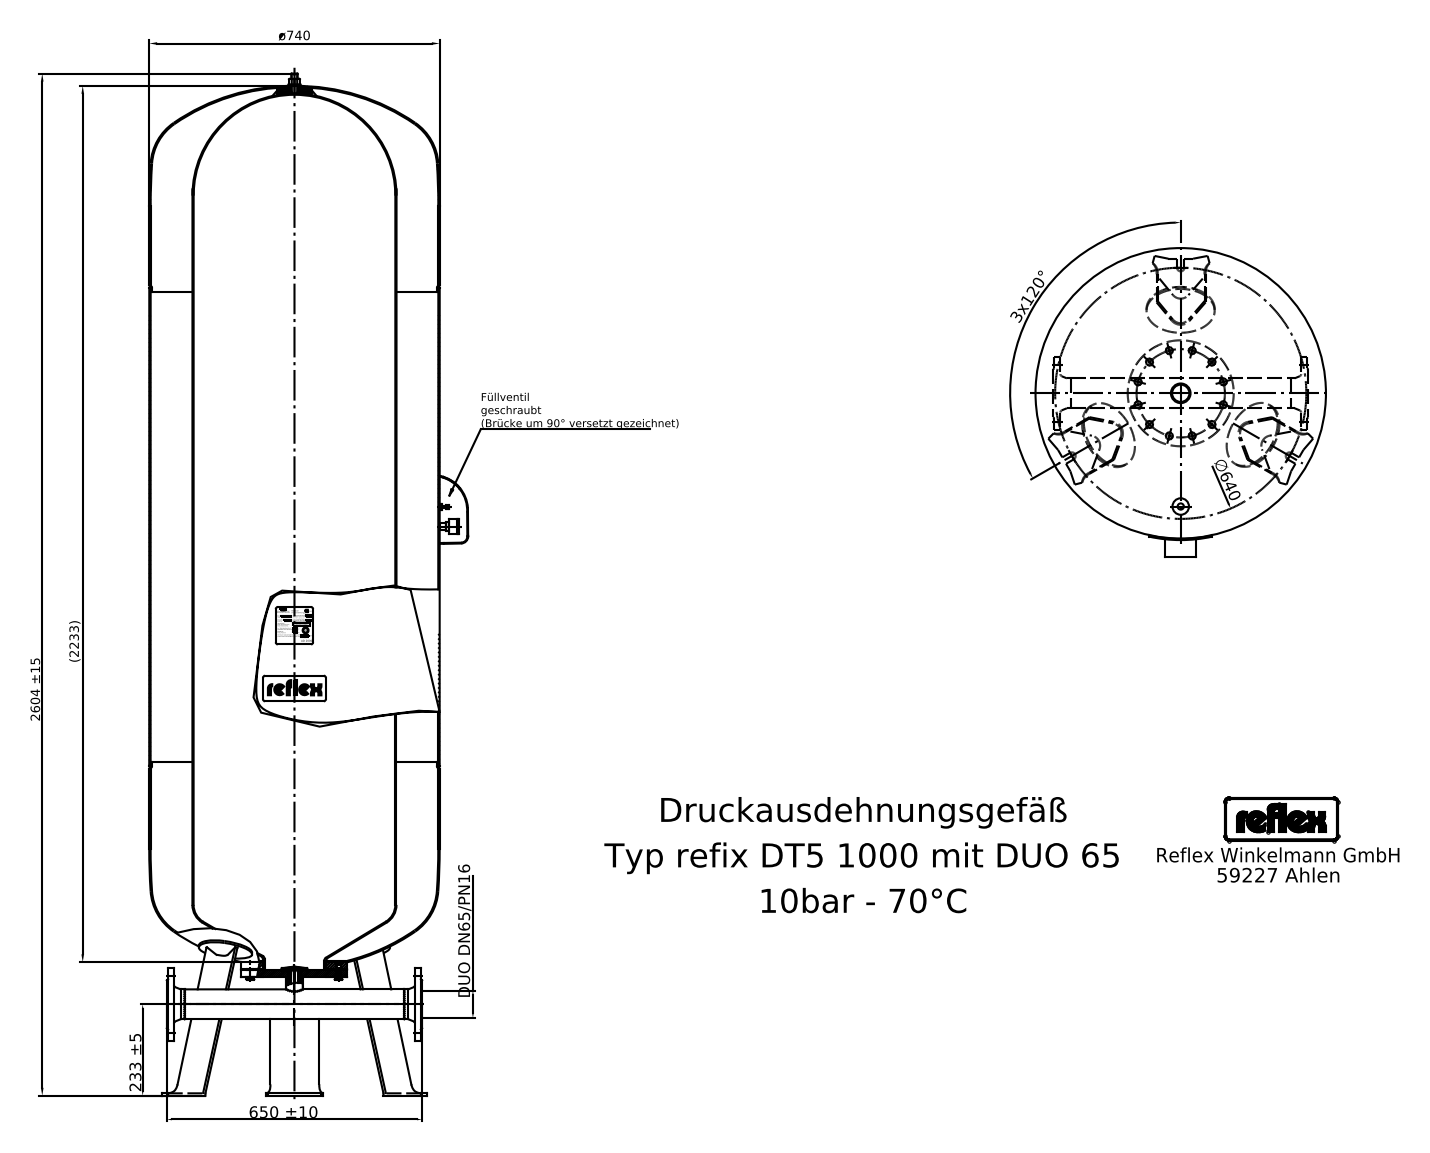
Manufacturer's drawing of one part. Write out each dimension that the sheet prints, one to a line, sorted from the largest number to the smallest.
2604 ±15
(2233)
ø740
650 ±10
∅640
233 ±5
3x120°
DUO DN65/PN16
